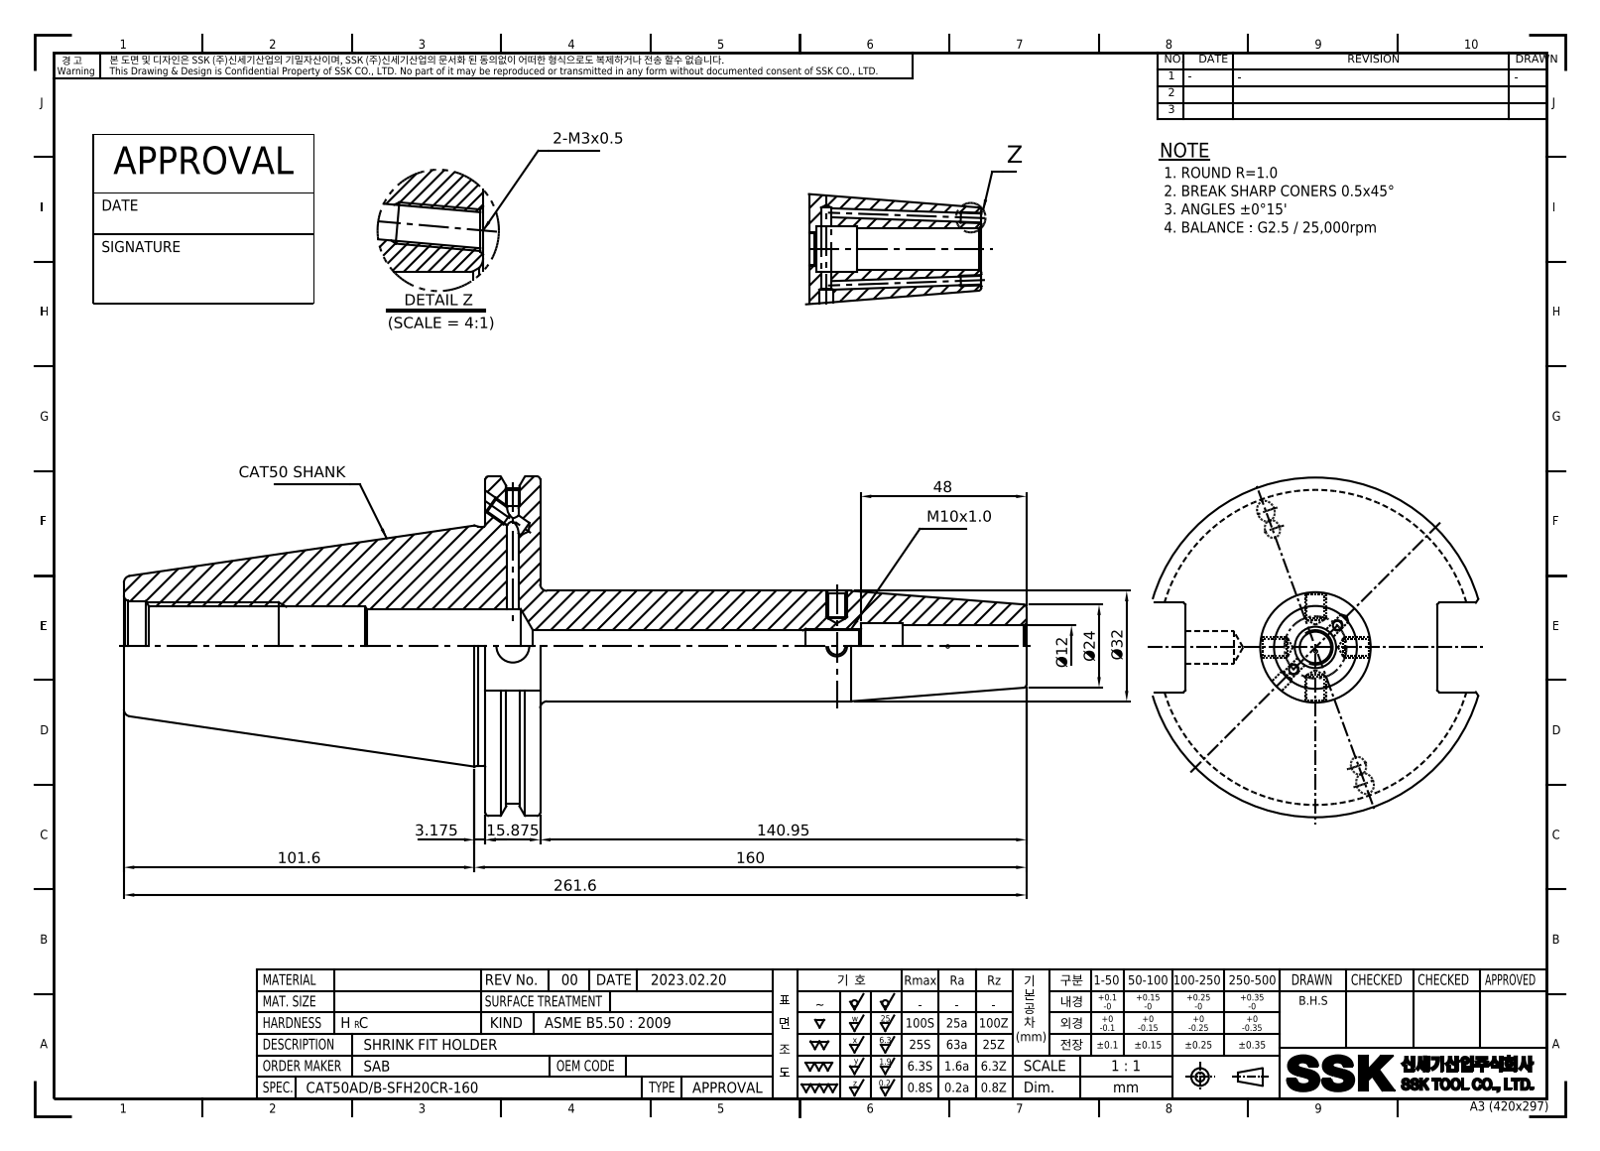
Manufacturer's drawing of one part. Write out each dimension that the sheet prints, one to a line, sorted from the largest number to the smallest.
261.6
160
140.95
101.6
48
Ø32
Ø24
15.875
Ø12
3.175
